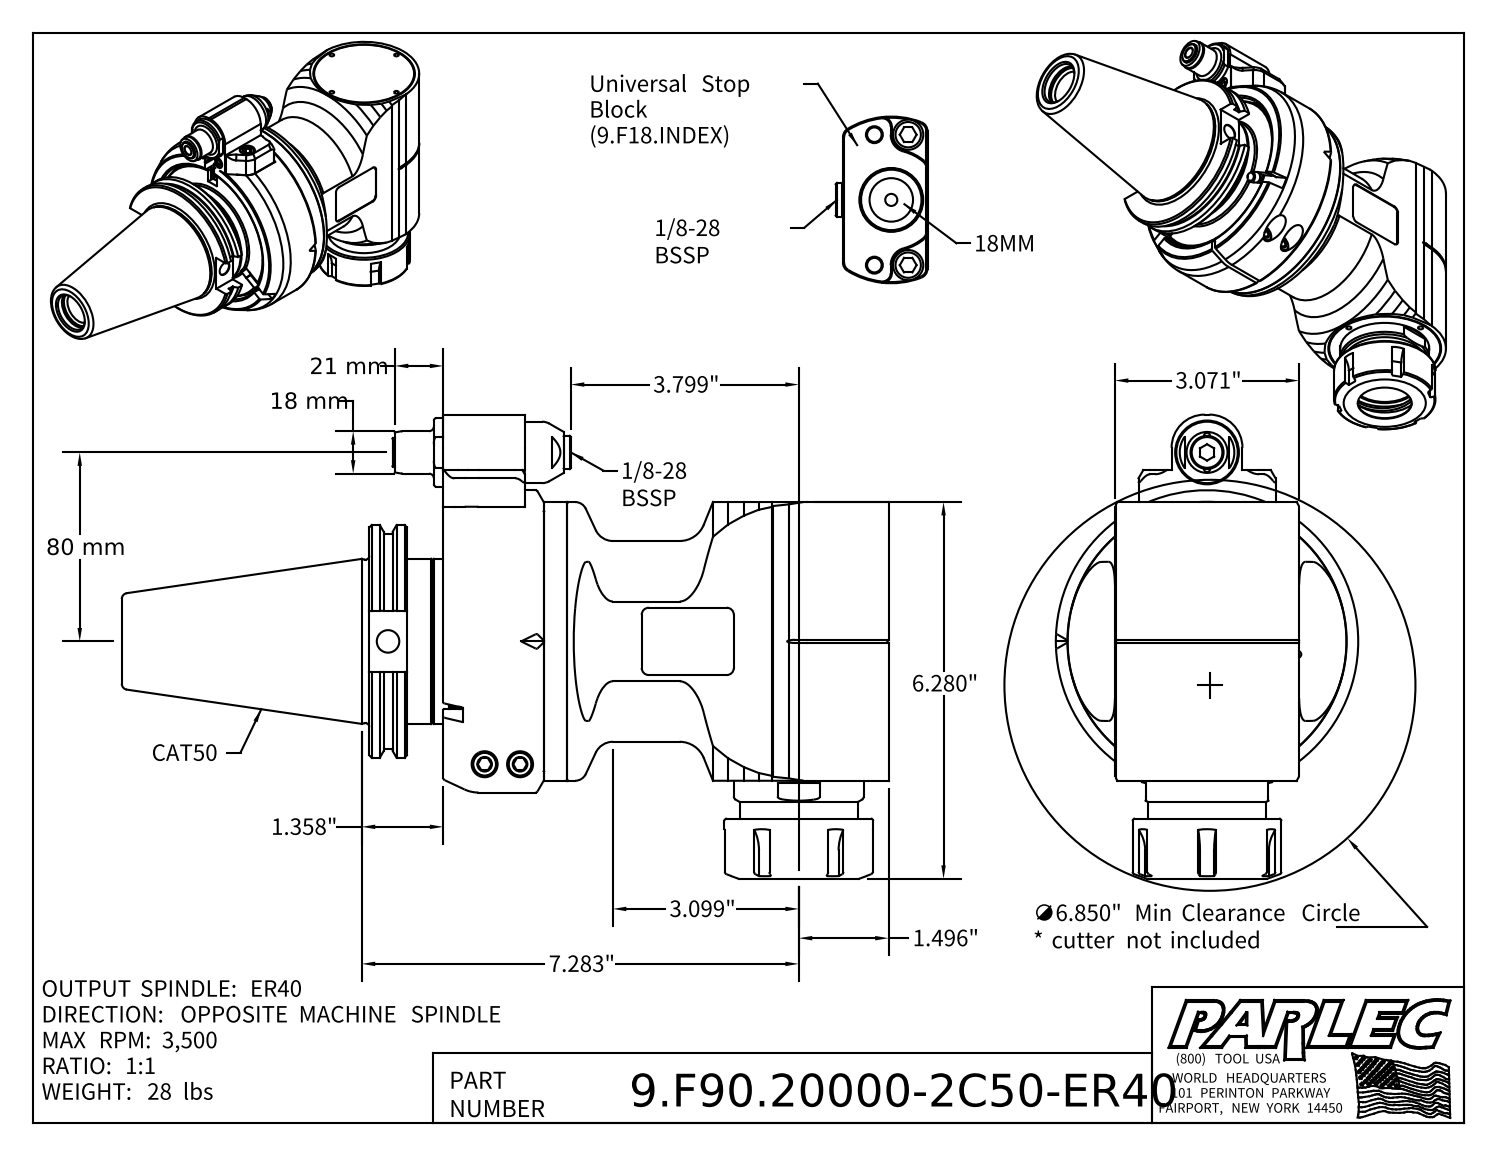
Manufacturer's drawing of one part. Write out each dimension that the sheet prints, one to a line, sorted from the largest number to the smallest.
80 mm
21 mm
18 mm
7.283"
∅6.850" Min Clearance Circle * cutter not included
6.280"
3.799"
3.099"
3.071"
1.496"
1.358"
